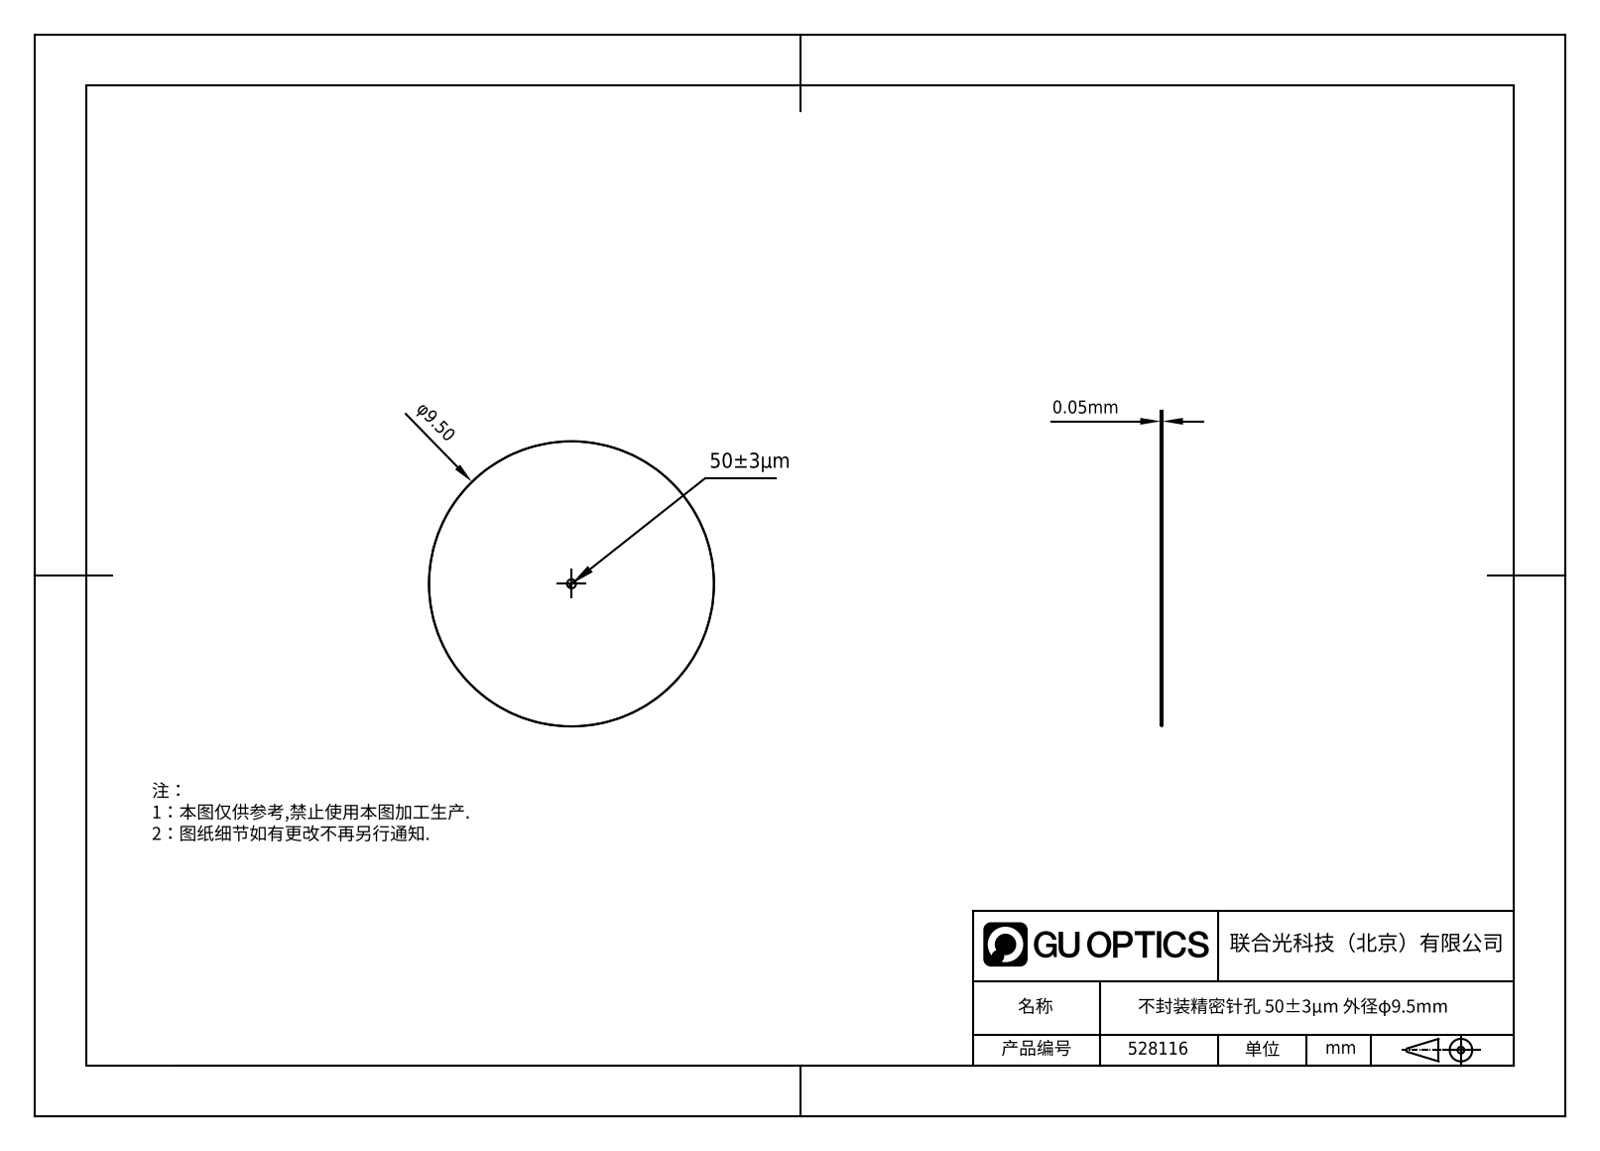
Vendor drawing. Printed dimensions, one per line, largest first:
φ9.50
0.05mm
